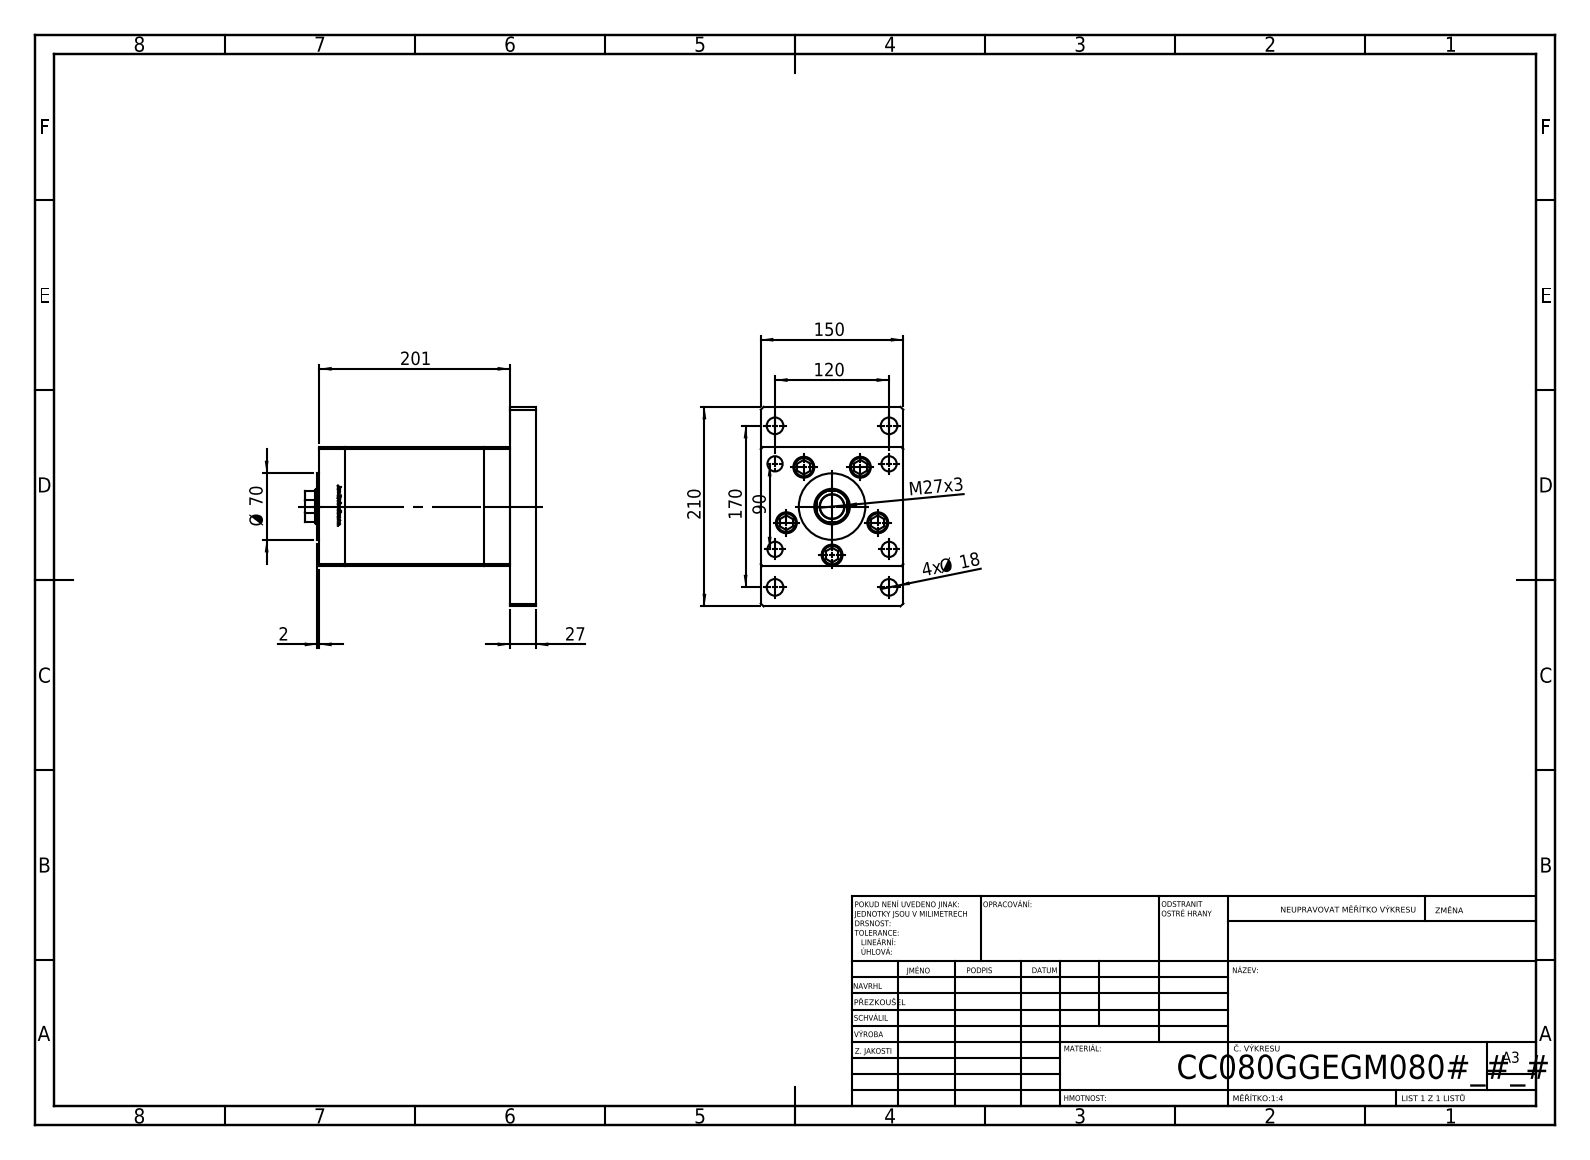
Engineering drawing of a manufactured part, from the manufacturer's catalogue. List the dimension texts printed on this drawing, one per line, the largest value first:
210
201
170
150
120
90
Ø 70
27
M27x3
4x Ø 18
2
